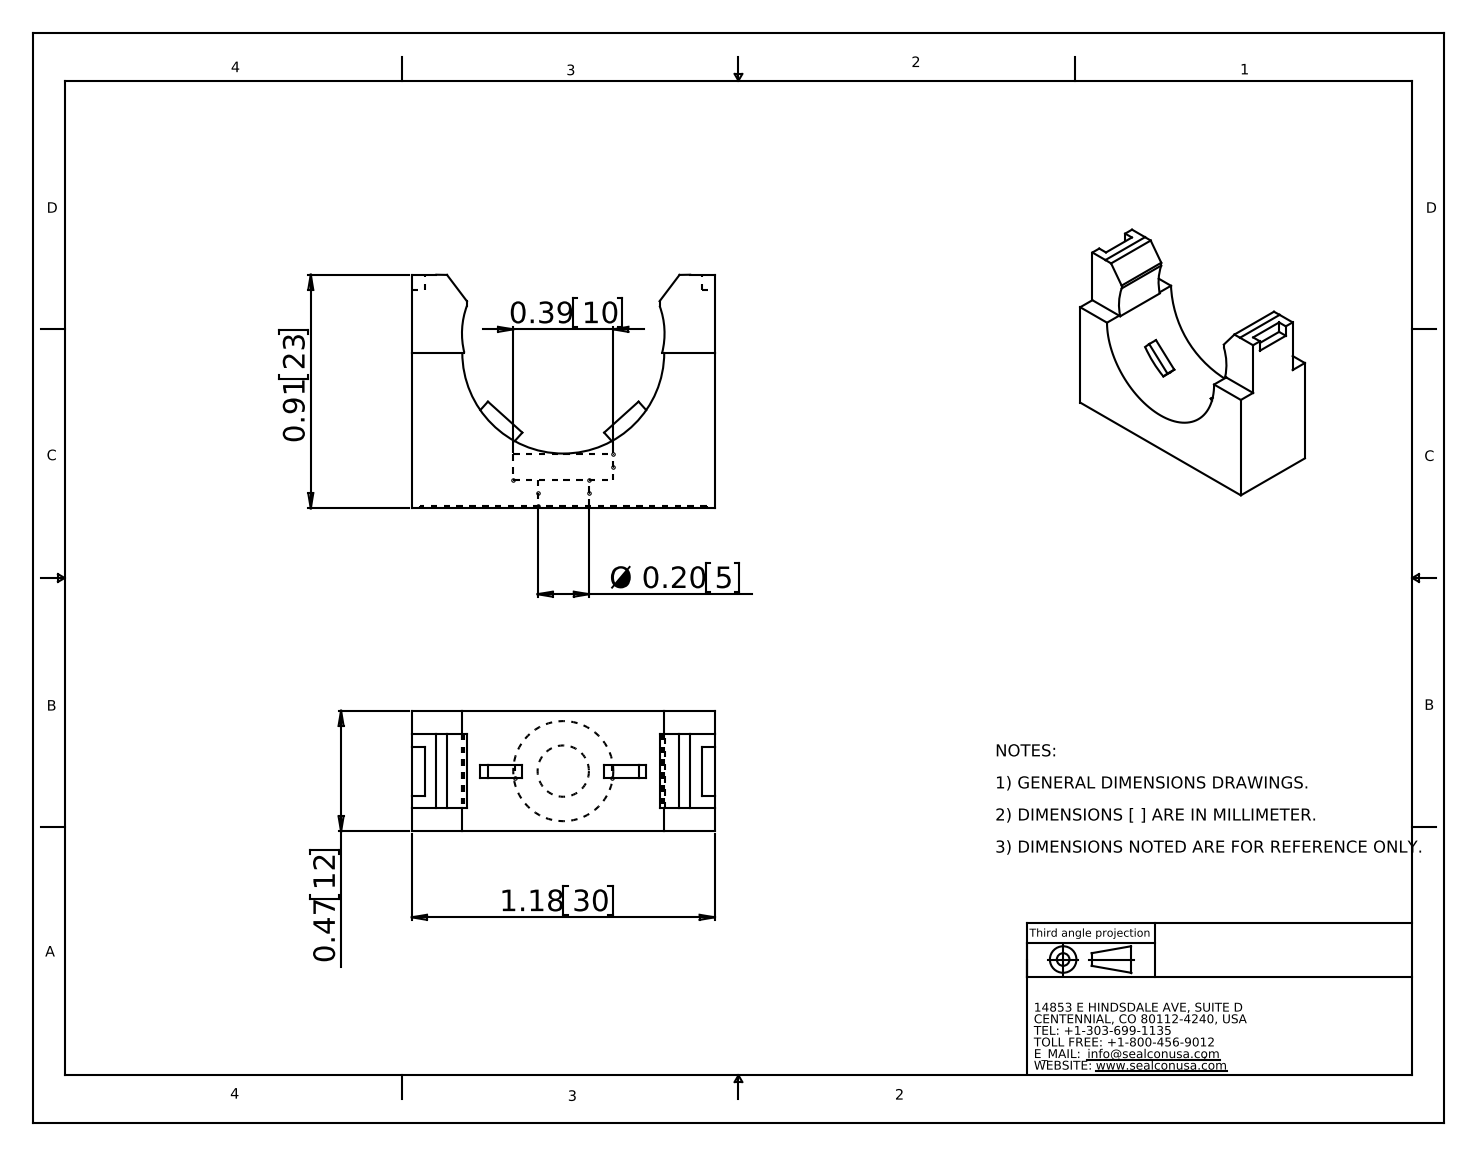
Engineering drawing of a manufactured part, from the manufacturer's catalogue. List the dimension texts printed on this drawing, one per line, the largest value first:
1.18 30
0.91 23
0.47 12
0.39 10
Ø 0.20 5
